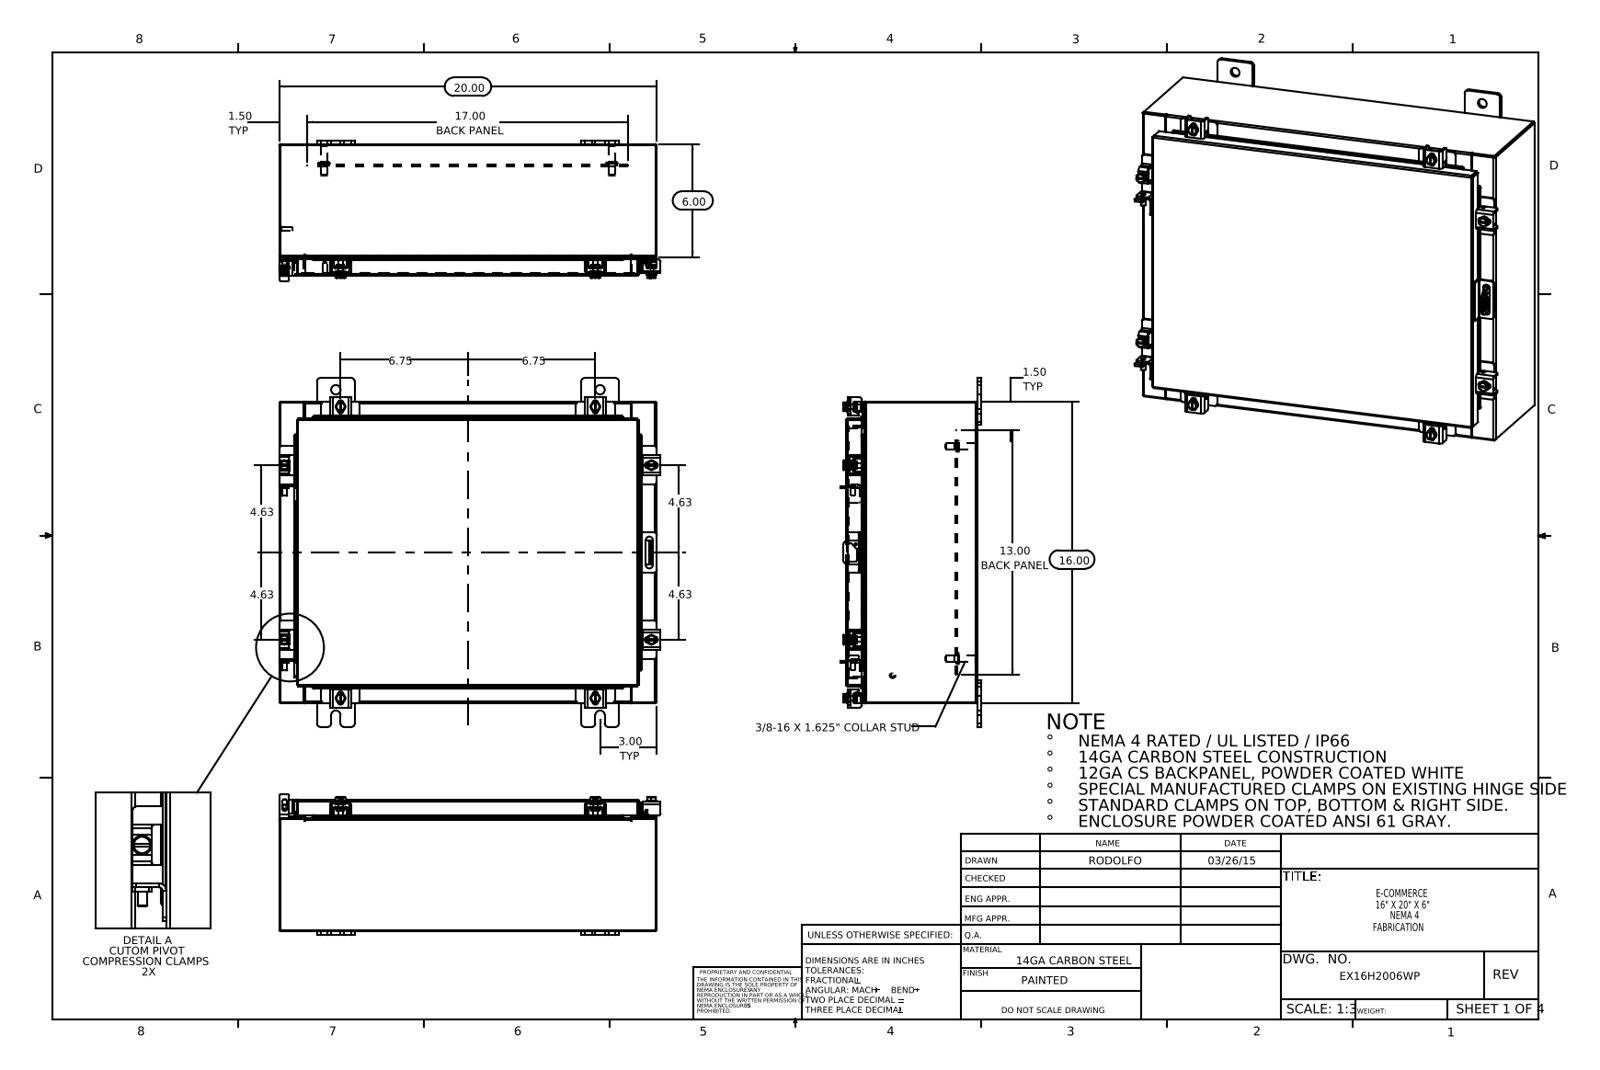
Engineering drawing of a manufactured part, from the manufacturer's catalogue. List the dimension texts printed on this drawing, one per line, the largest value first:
20.00
17.00 BACK PANEL
16.00
13.00 BACK PANEL
6.75
6.75
6.00
4.63
4.63
4.63
4.63
3.00 TYP
1.50 TYP
1.50 TYP
